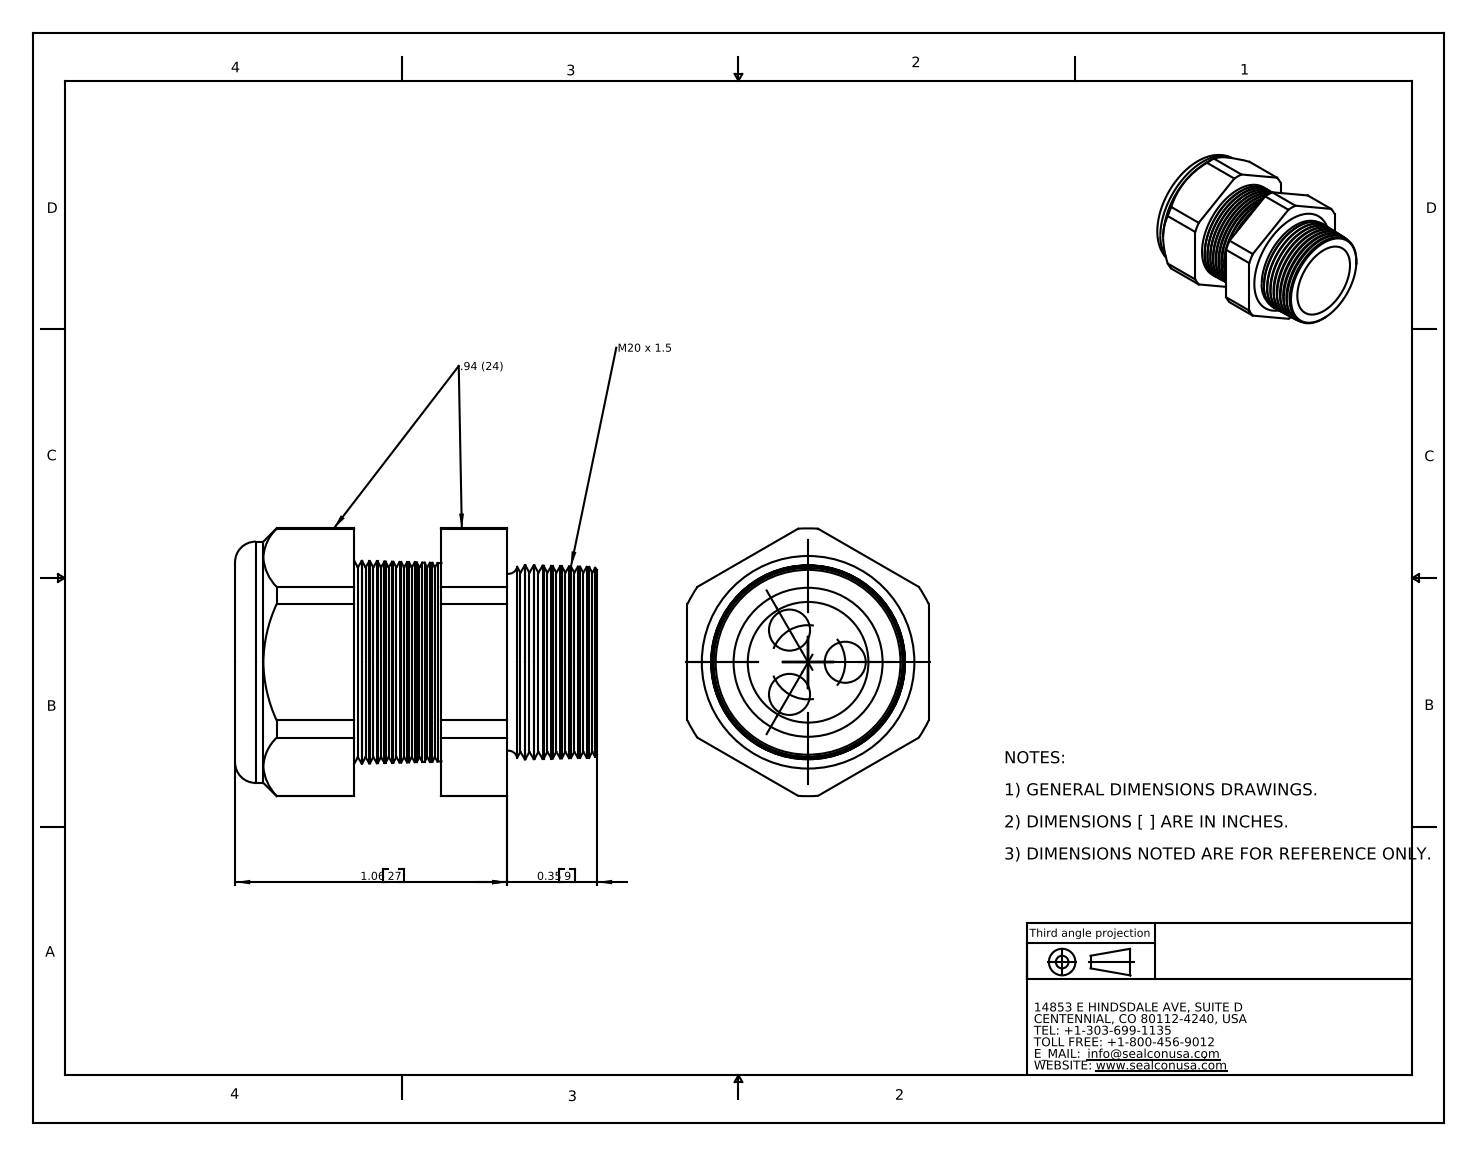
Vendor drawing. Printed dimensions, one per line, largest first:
1.06 27
0.35 9
